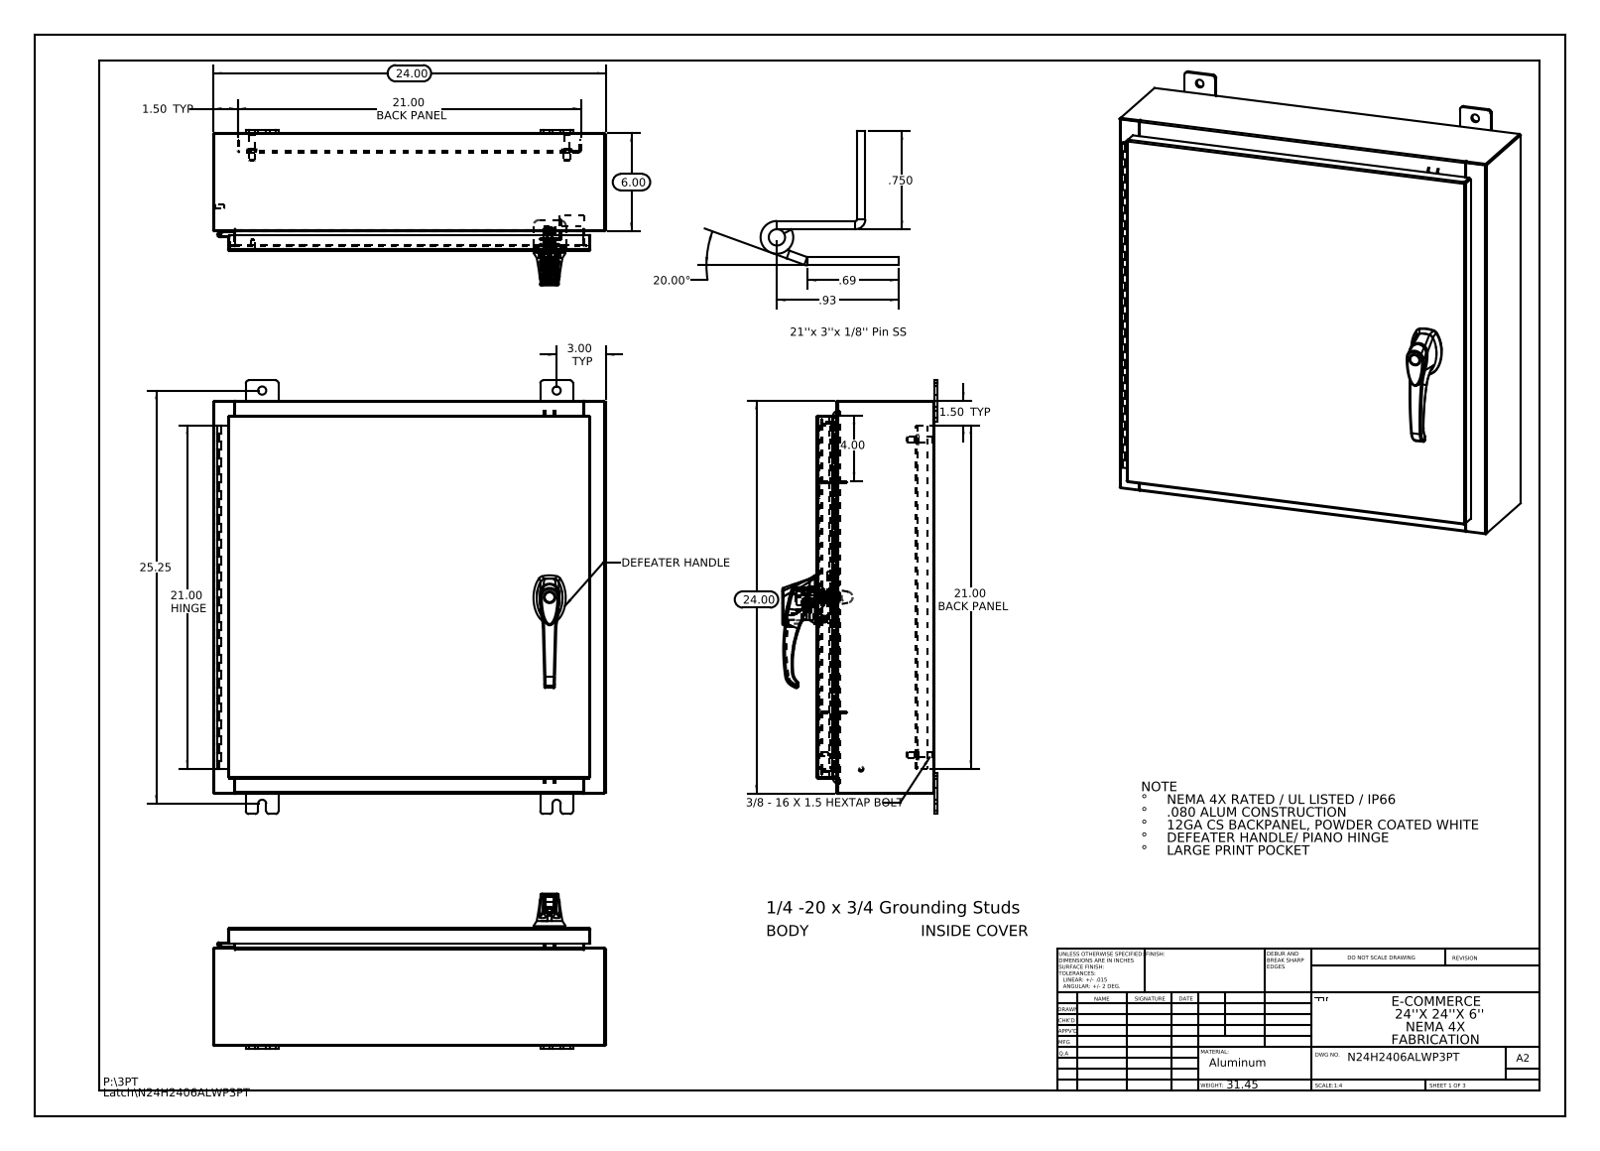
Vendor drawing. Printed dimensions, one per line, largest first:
25.25
24.00
24.00
21.00 HINGE
21.00 BACK PANEL
21.00 BACK PANEL
20.00°
6.00
4.00
3.00 TYP
1.50 TYP
1.50 TYP
.93
.750
.69
